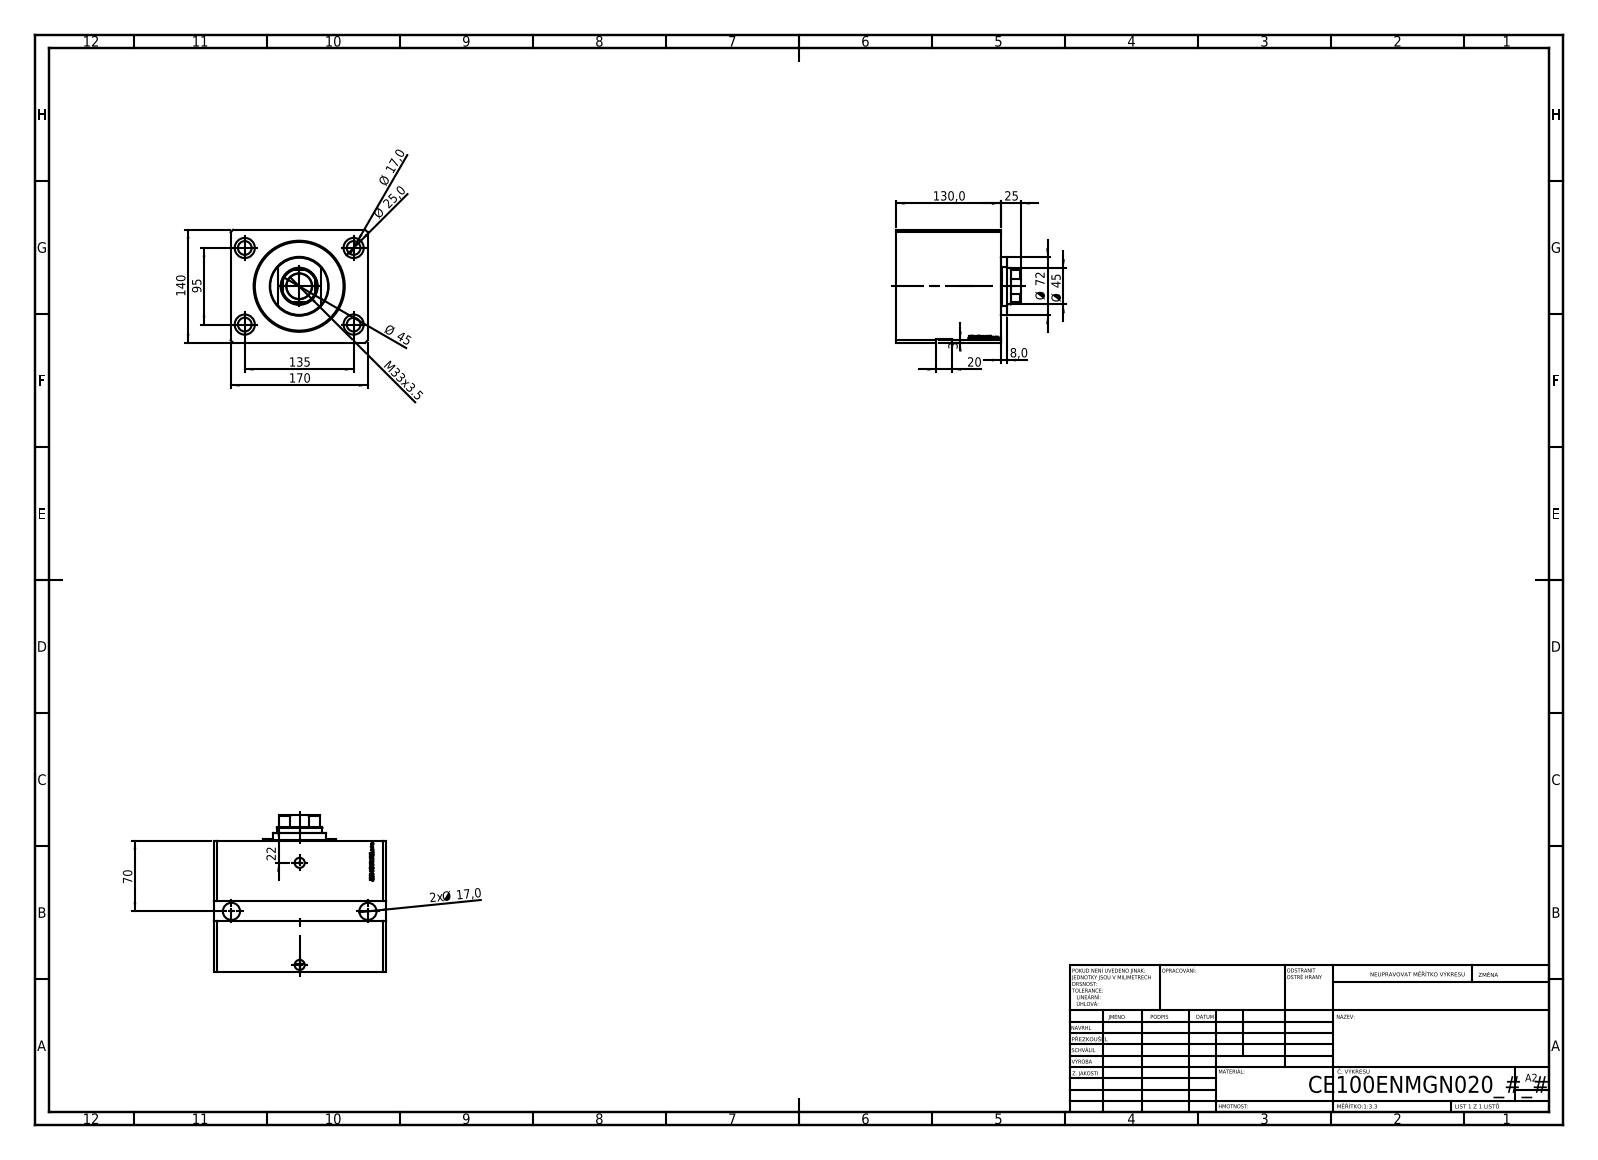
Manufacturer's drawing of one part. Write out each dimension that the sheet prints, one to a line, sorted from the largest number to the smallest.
170
140
135
130,0
95
Ø 72
70
Ø 45
Ø 45
M33x3.5
Ø 25,0
25
22
20
Ø 17,0
2x Ø 17,0
8,0
3
